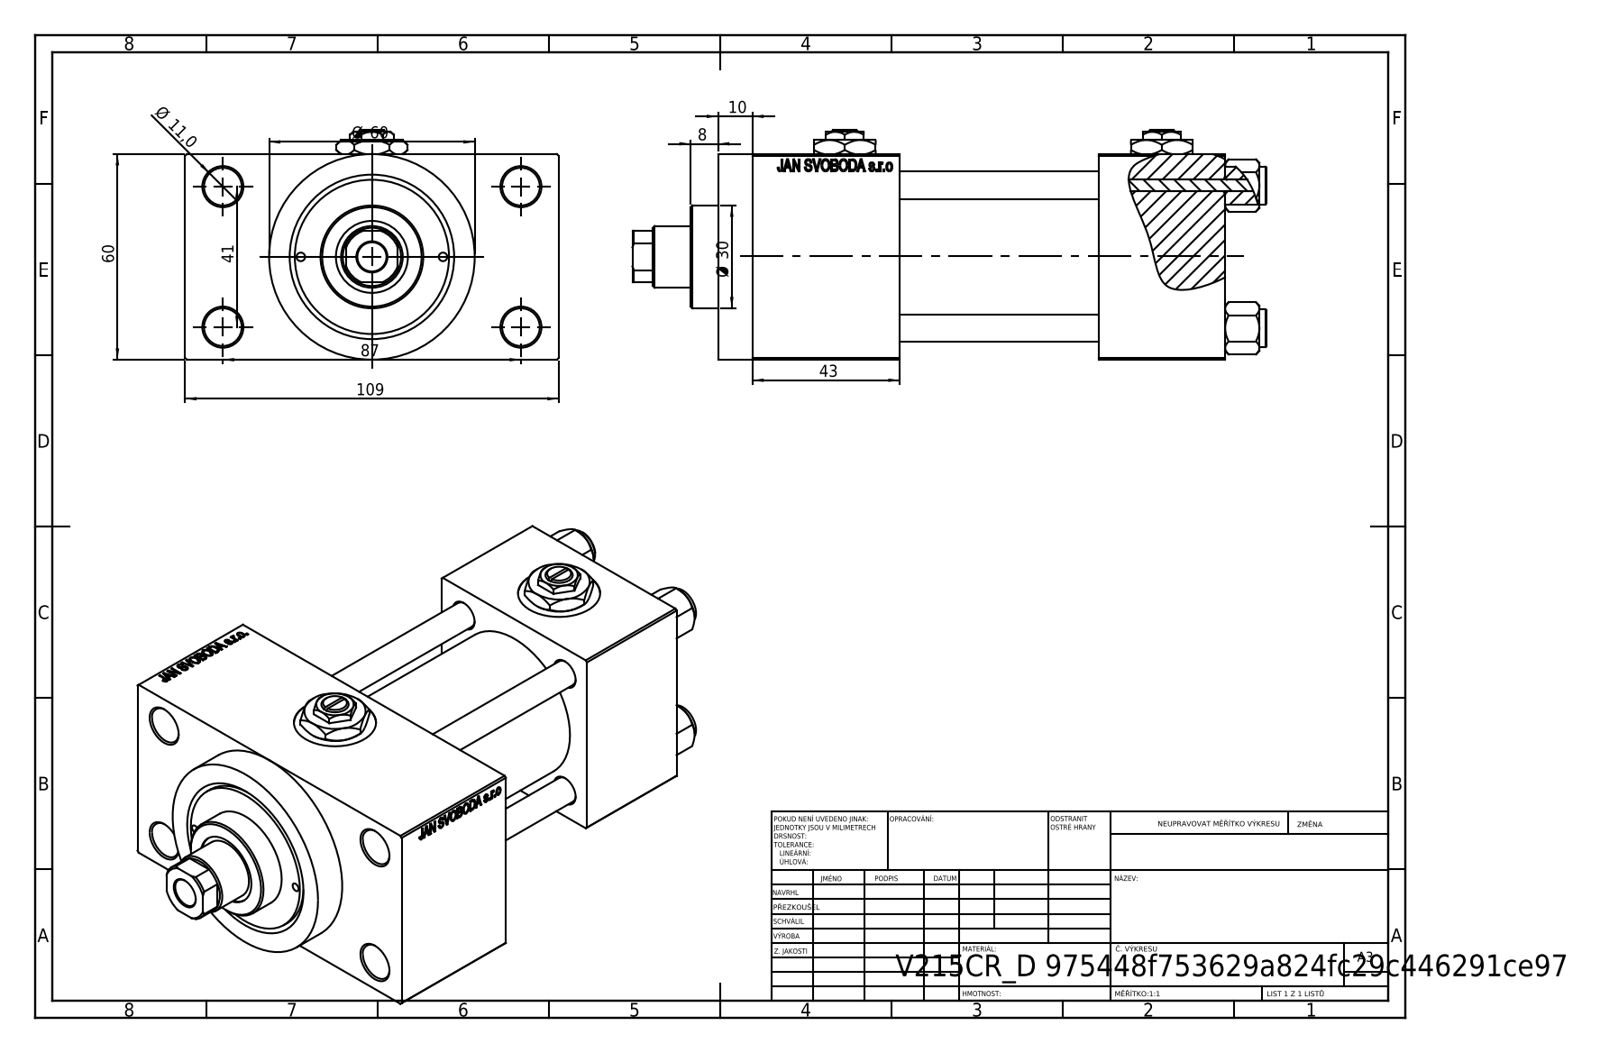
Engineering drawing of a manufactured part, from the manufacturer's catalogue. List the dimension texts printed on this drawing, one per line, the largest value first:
109
87
60
Ø 60
43
41
Ø 30
Ø 11,0
10
8
